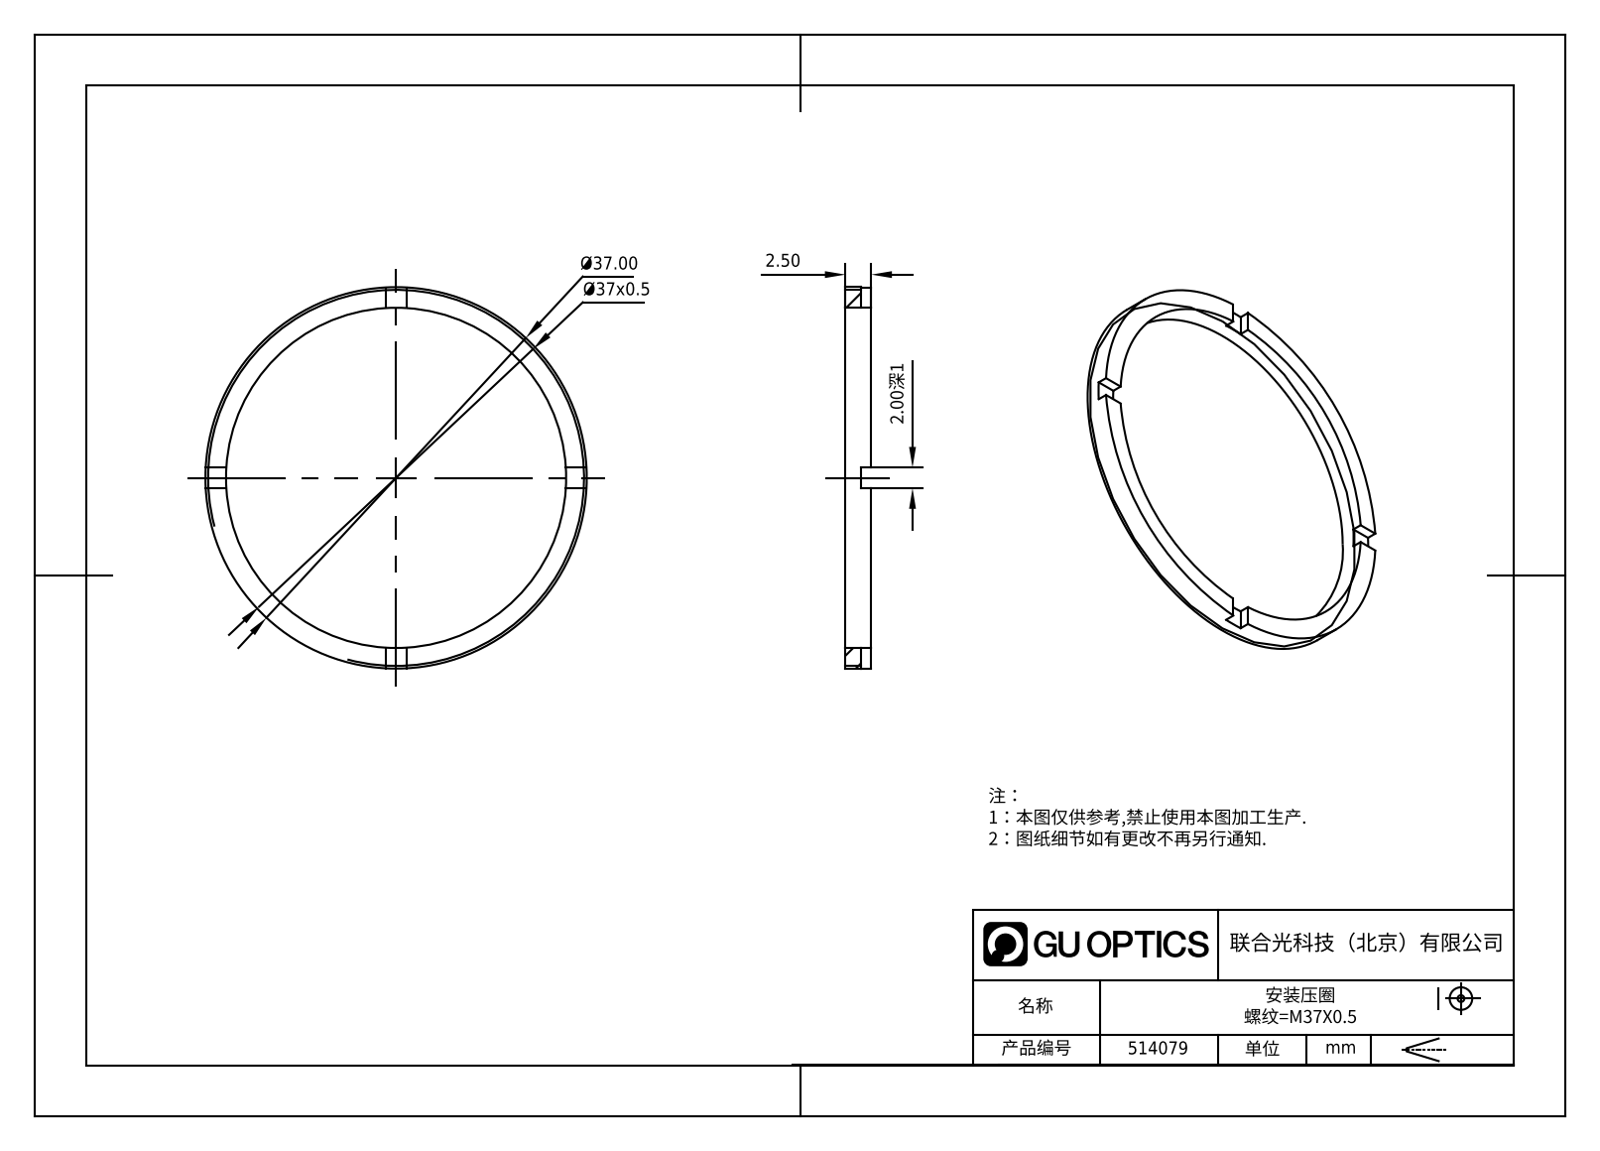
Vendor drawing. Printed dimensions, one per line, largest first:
Ø37.00
Ø37x0.5
2.50
2.00深1
